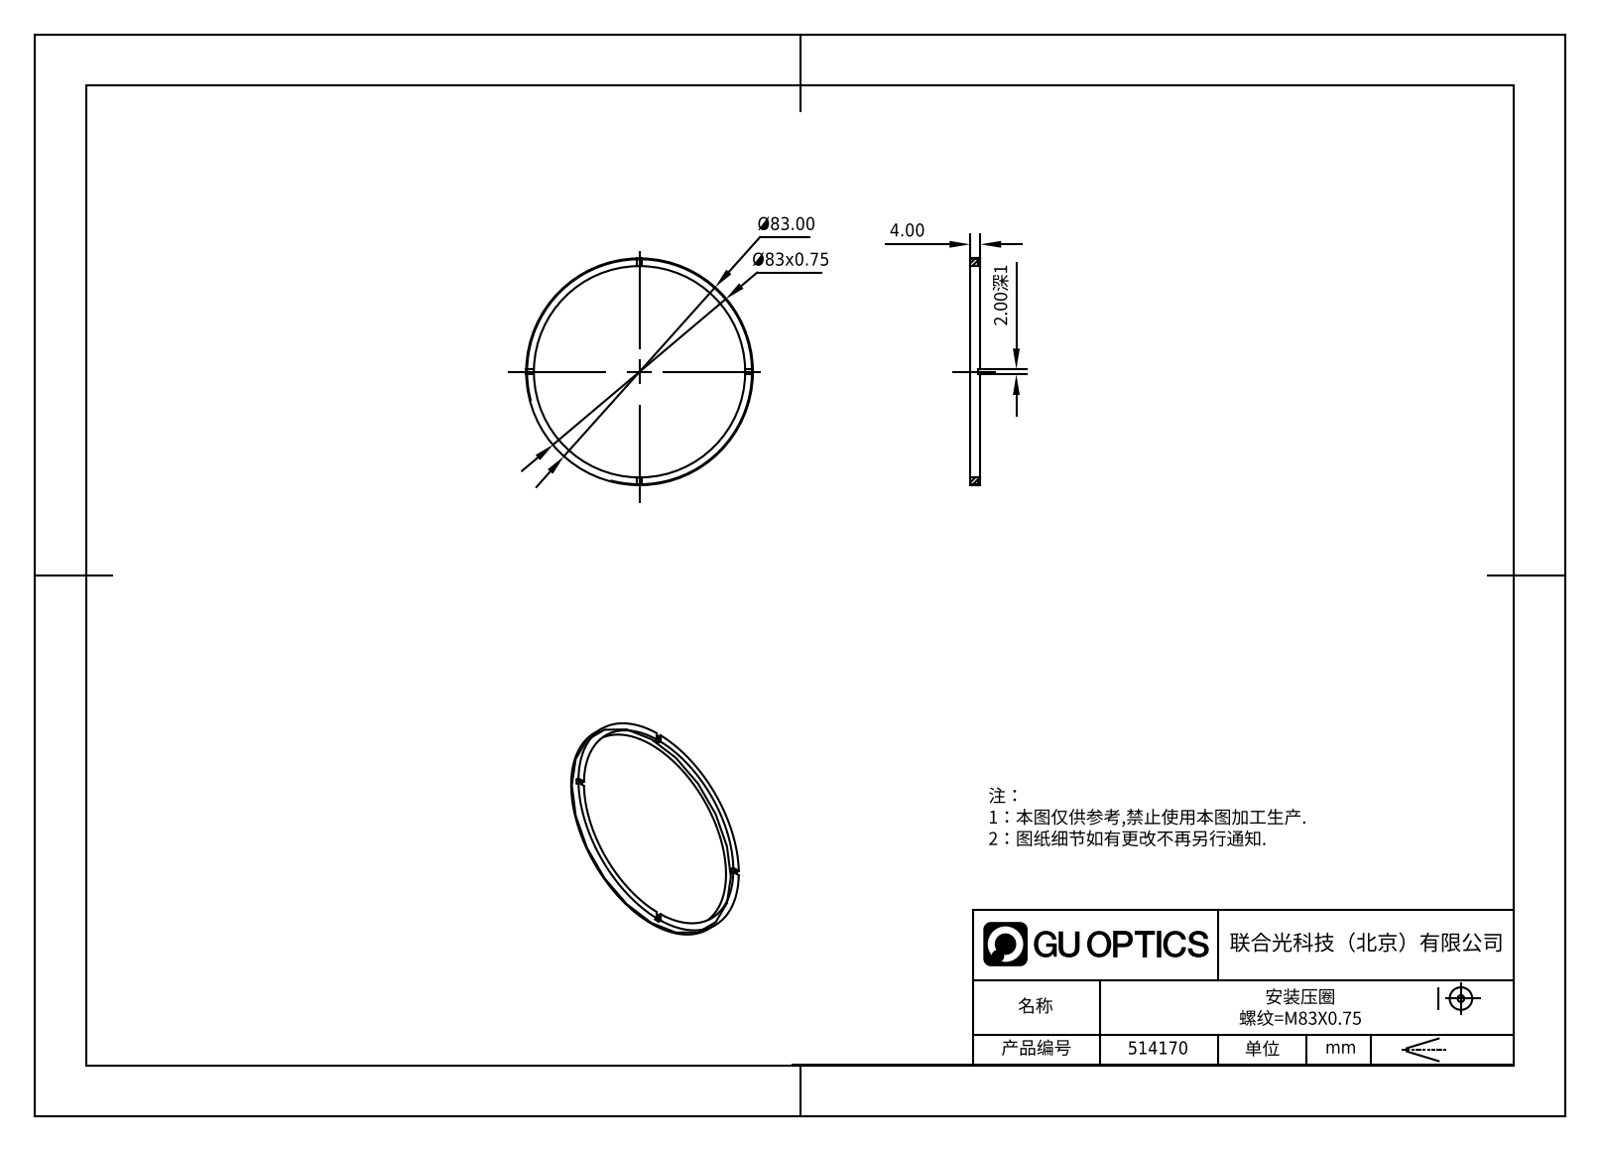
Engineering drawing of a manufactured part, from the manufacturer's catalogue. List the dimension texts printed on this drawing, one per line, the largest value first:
Ø83.00
Ø83x0.75
4.00
2.00深1
